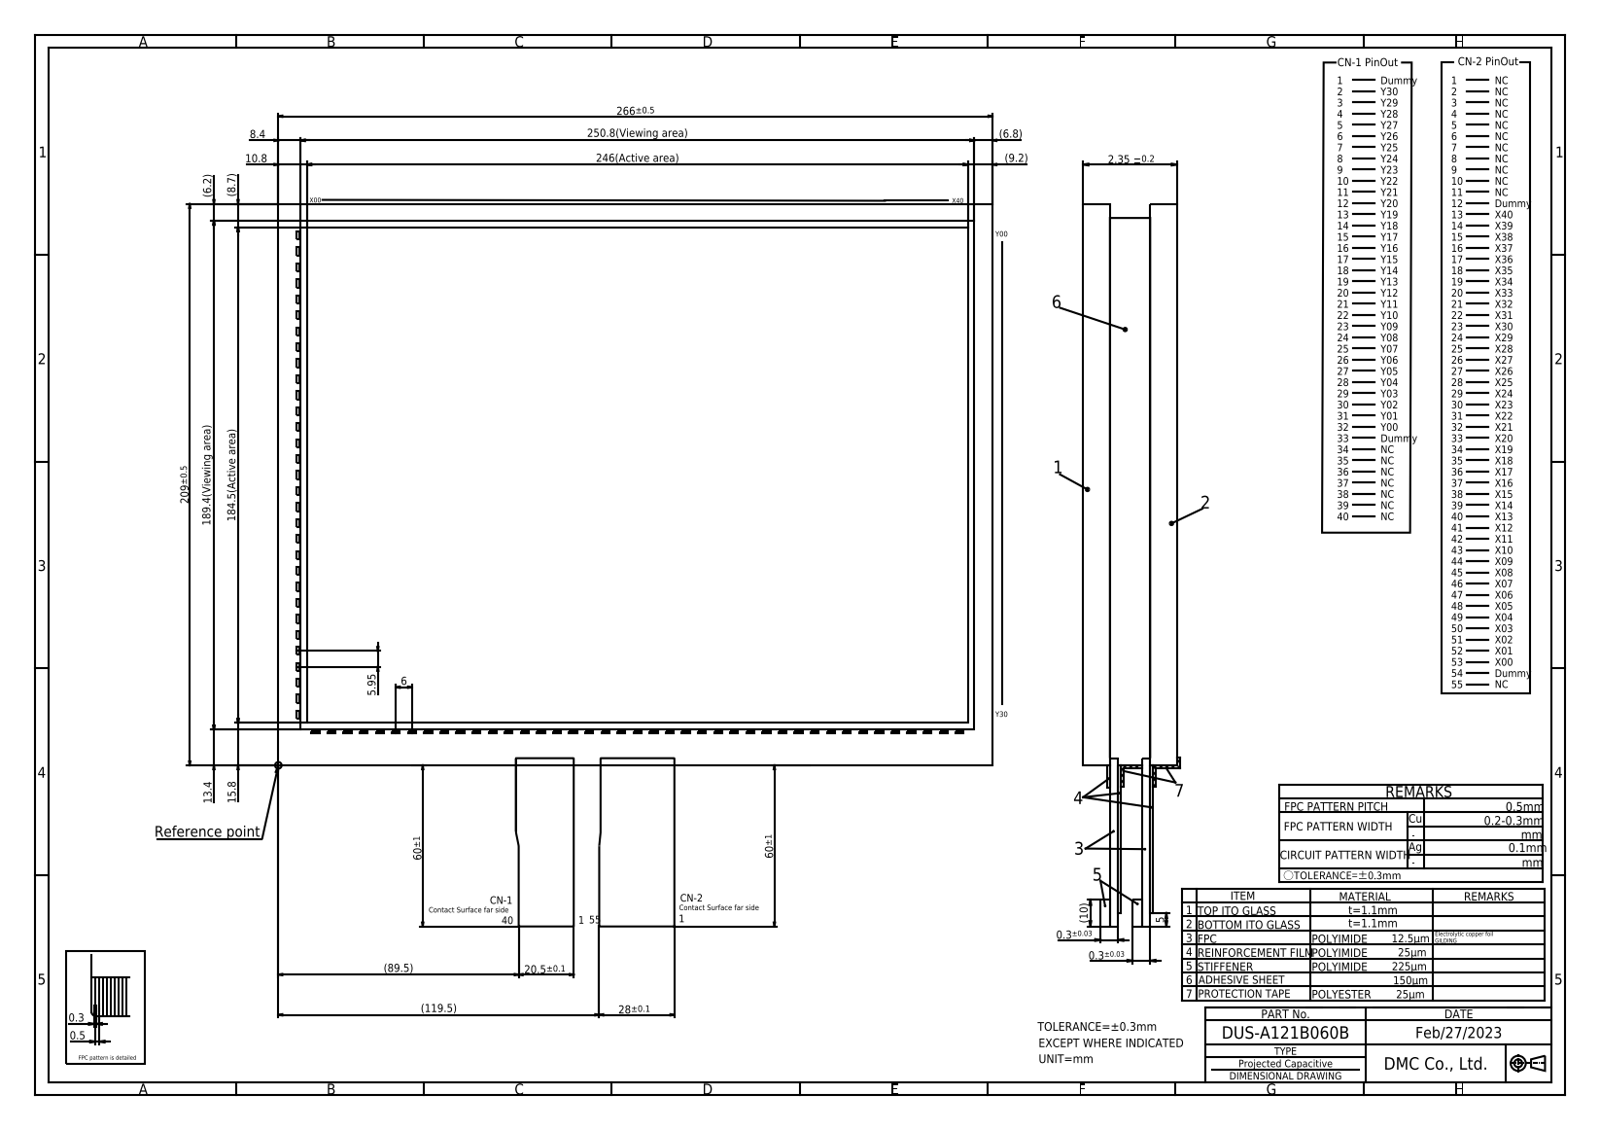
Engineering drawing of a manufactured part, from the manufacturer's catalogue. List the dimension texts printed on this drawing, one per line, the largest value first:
266±0.5
250.8(Viewing area)
246(Active area)
209±0.5
189.4(Viewing area)
184.5(Active area)
(119.5)
(89.5)
60±1
60±1
28±0.1
20.5±0.1
15.8
13.4
10.8
(10)
(9.2)
(8.7)
8.4
(6.8)
(6.2)
6
5.95
5
2.35 ±0.2
0.5
0.3
0.3±0.03
0.3±0.03
